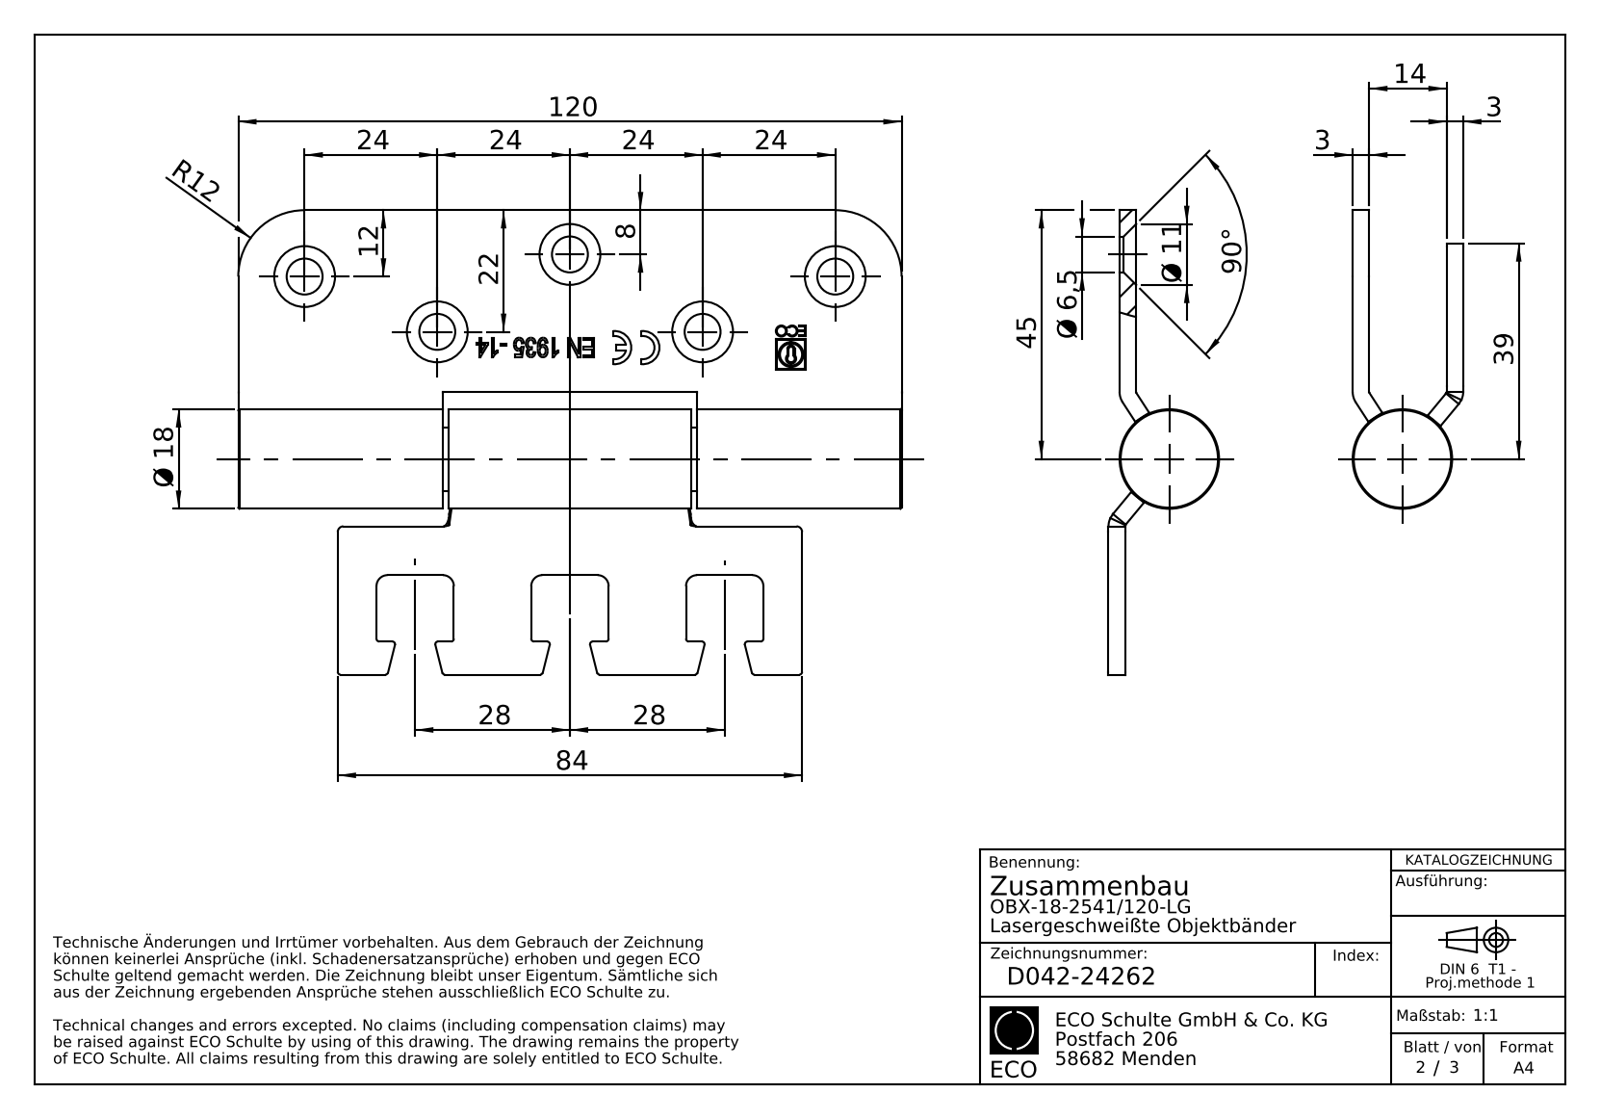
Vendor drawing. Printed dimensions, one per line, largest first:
120
90°
84
45
39
28
28
24
24
24
24
22
Ø 18
14
R12
12
Ø 11
8
Ø 6,5
3
3
